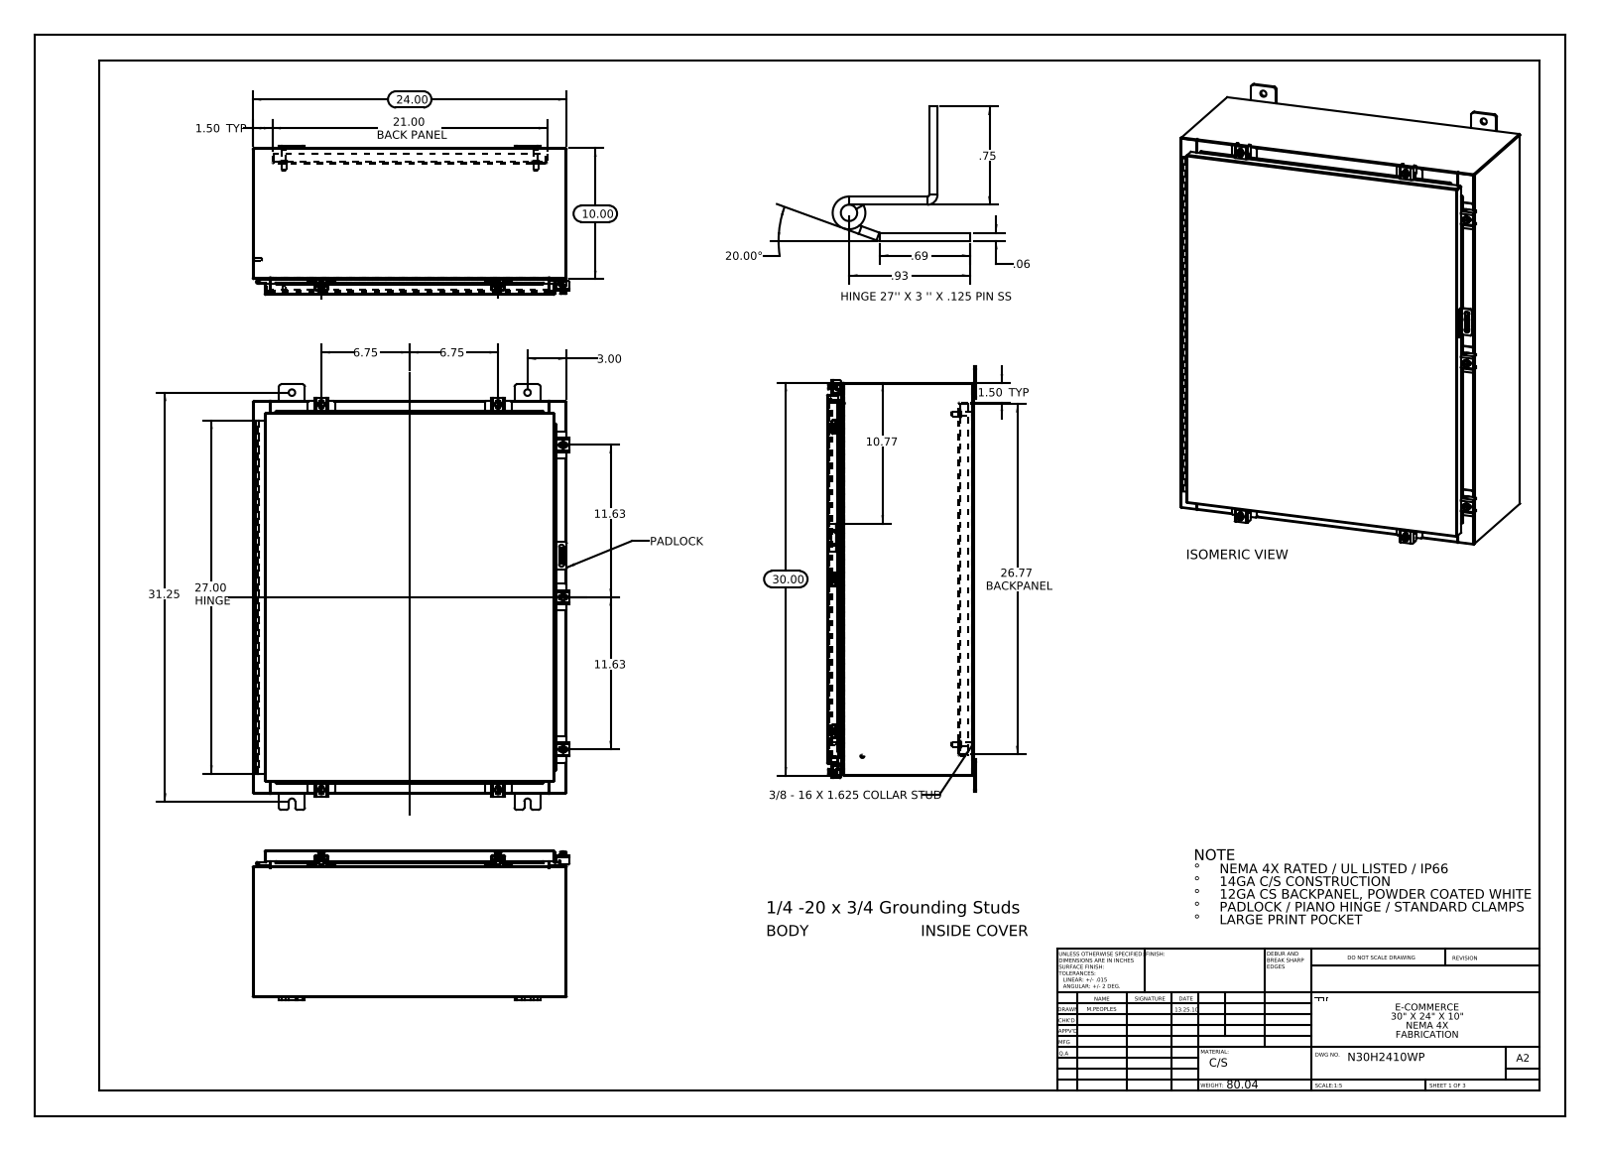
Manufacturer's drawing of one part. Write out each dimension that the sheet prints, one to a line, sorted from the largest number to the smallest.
31.25
30.00
27.00 HINGE
26.77 BACKPANEL
24.00
21.00 BACK PANEL
20.00°
11.63
11.63
10.77
10.00
6.75
6.75
3.00
1.50 TYP
1.50 TYP
.93
.75
.69
.06
